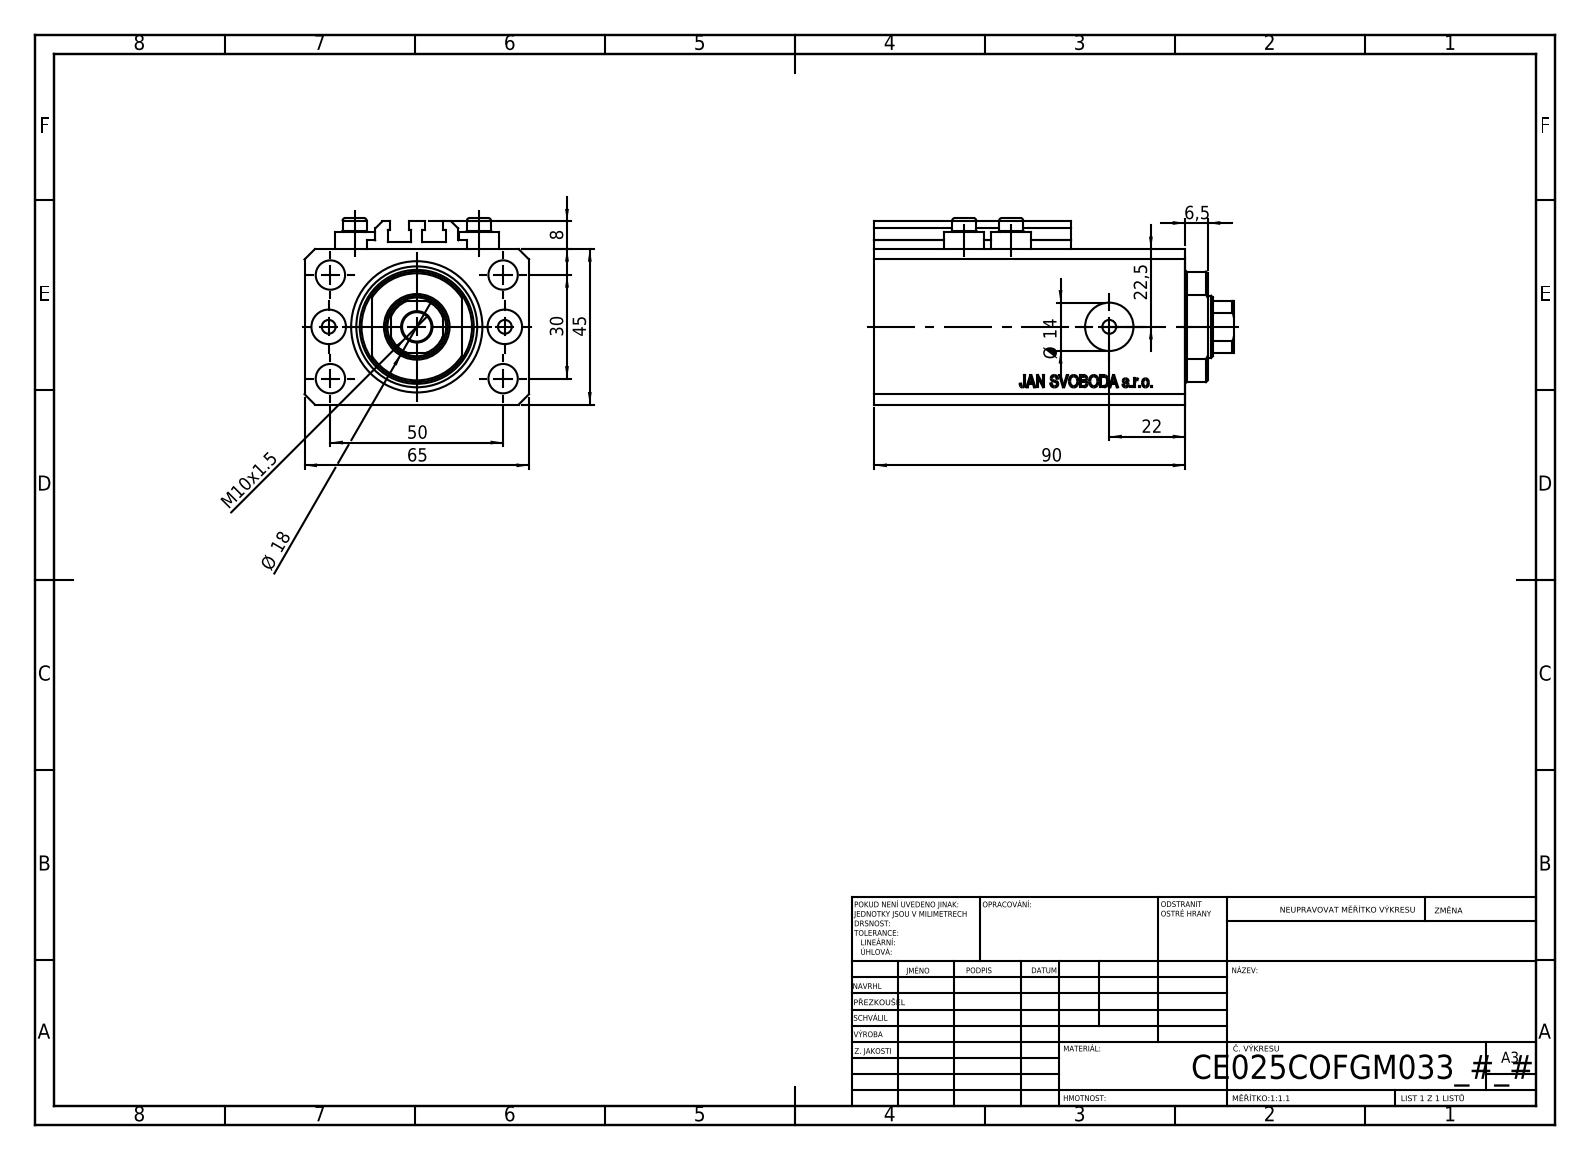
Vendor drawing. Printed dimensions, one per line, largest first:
90
65
50
45
30
22,5
22
Ø 18
Ø 14
M10x1.5
8
6,5
